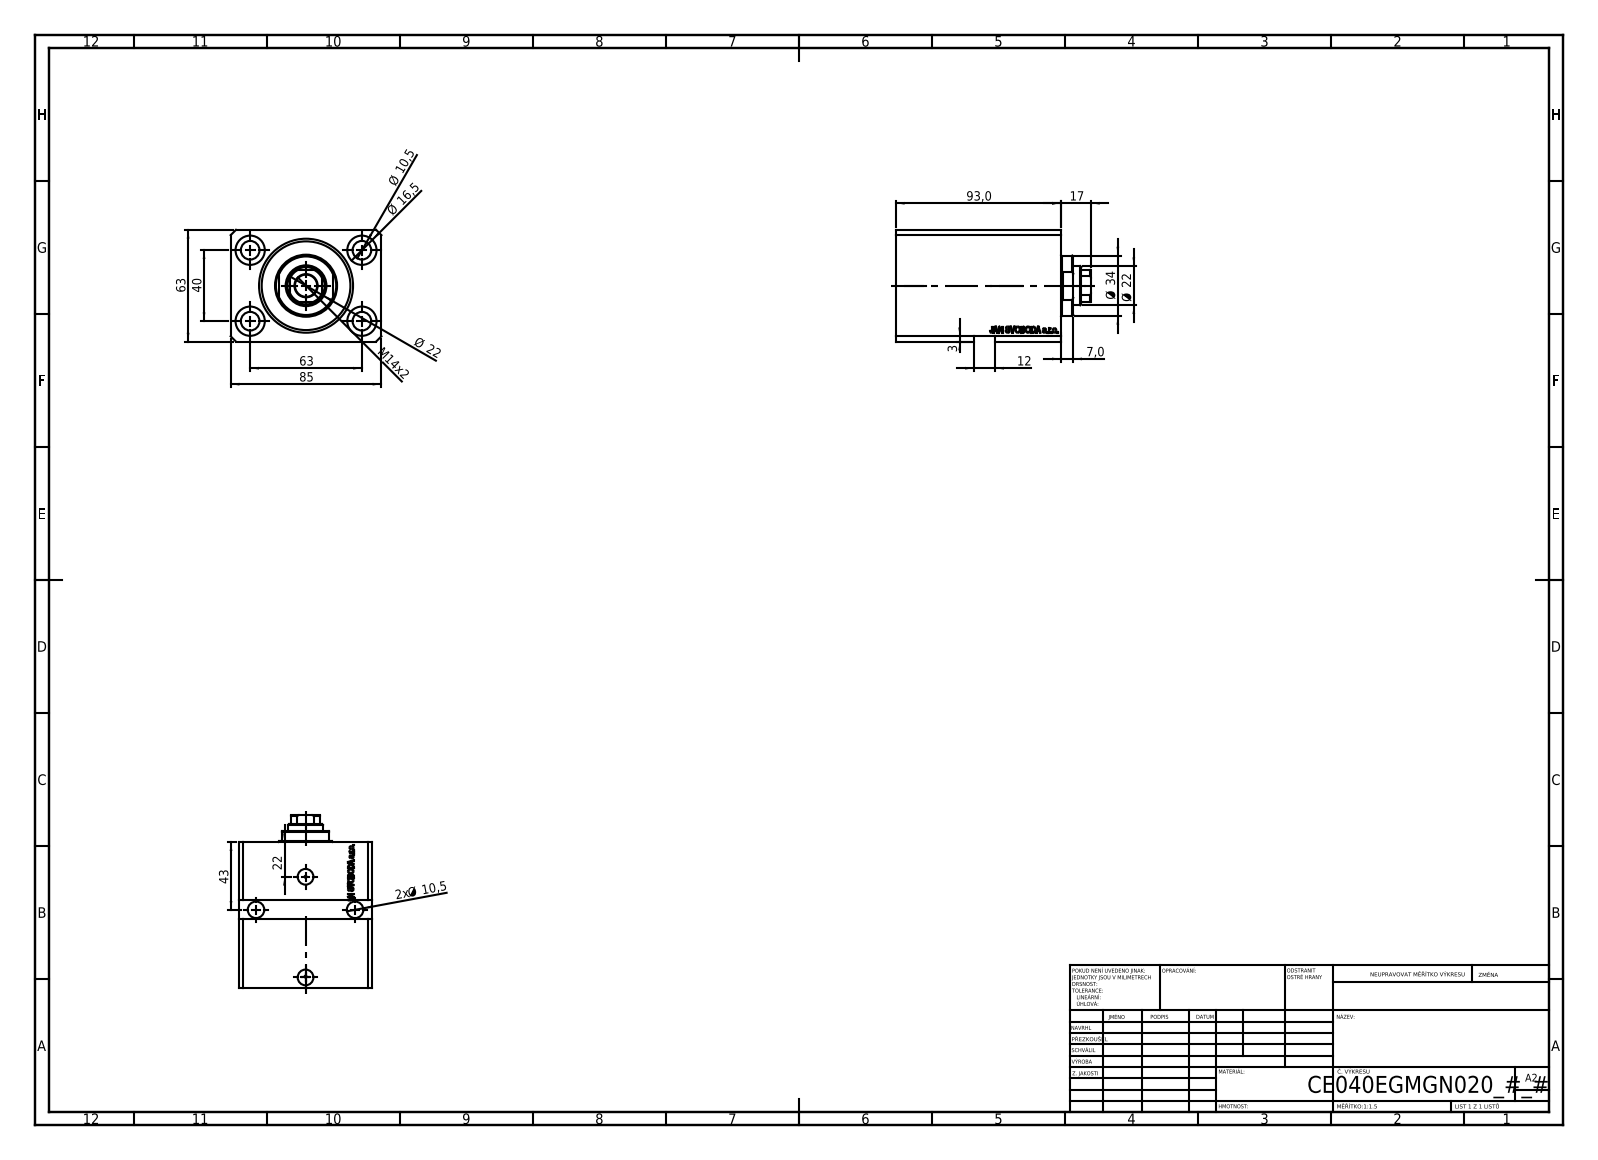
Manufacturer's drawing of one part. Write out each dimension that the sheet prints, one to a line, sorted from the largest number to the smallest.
93,0
85
63
63
43
40
Ø 34
Ø 22
Ø 22
22
17
Ø 16,5
M14x2
12
Ø 10,5
2x Ø 10,5
7,0
3
